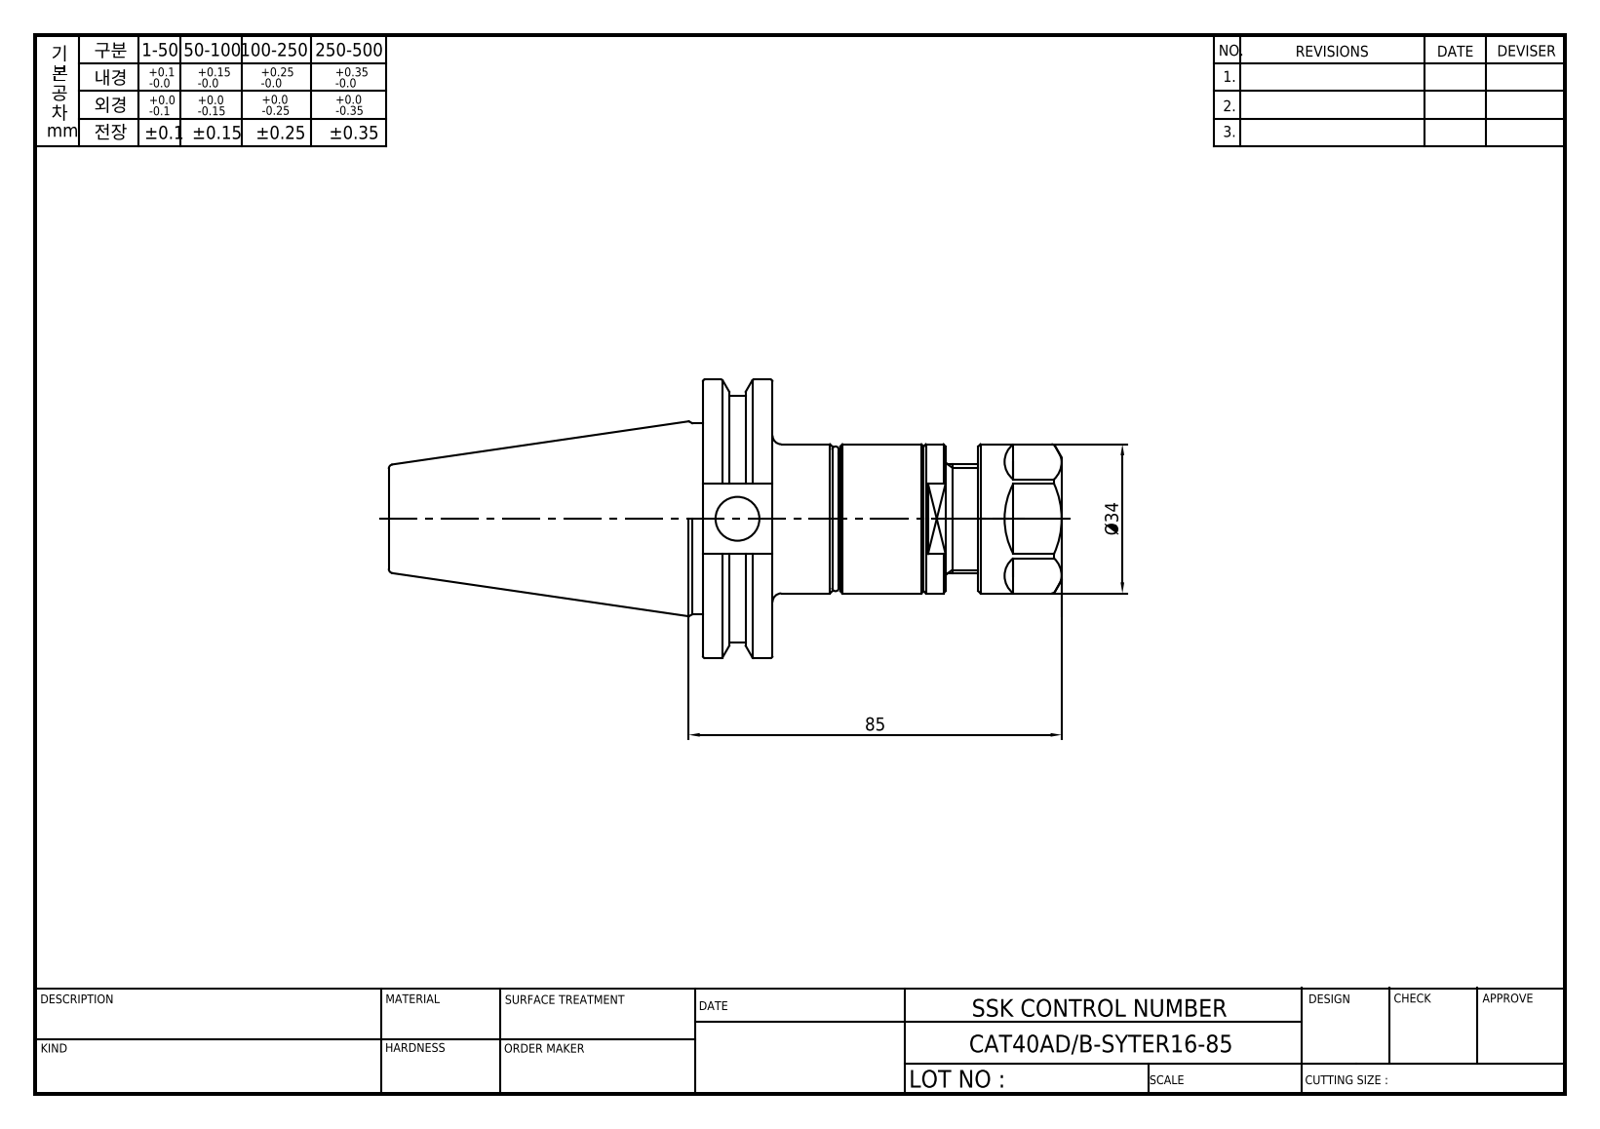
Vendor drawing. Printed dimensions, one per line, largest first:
85
Ø34
